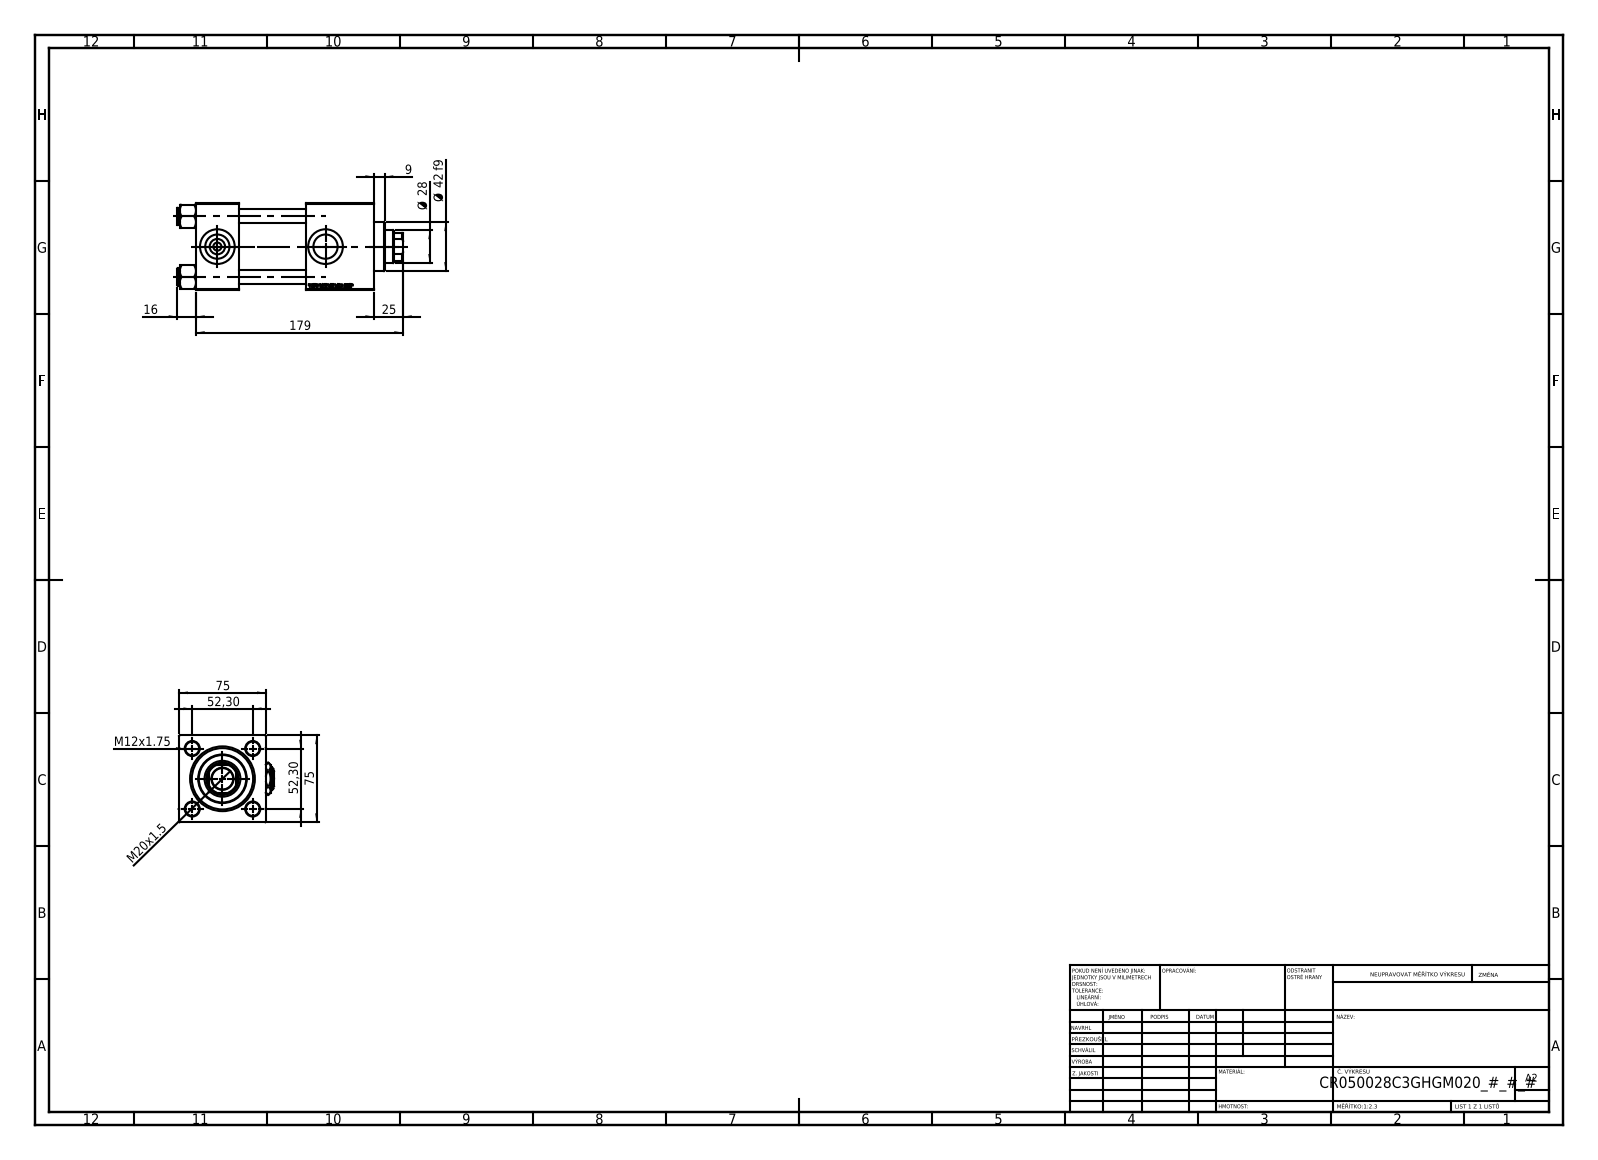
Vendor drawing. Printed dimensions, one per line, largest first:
179
75
75
52,30
52,30
Ø 42 f9
Ø 28
25
M20x1.5
16
M12x1.75
9
